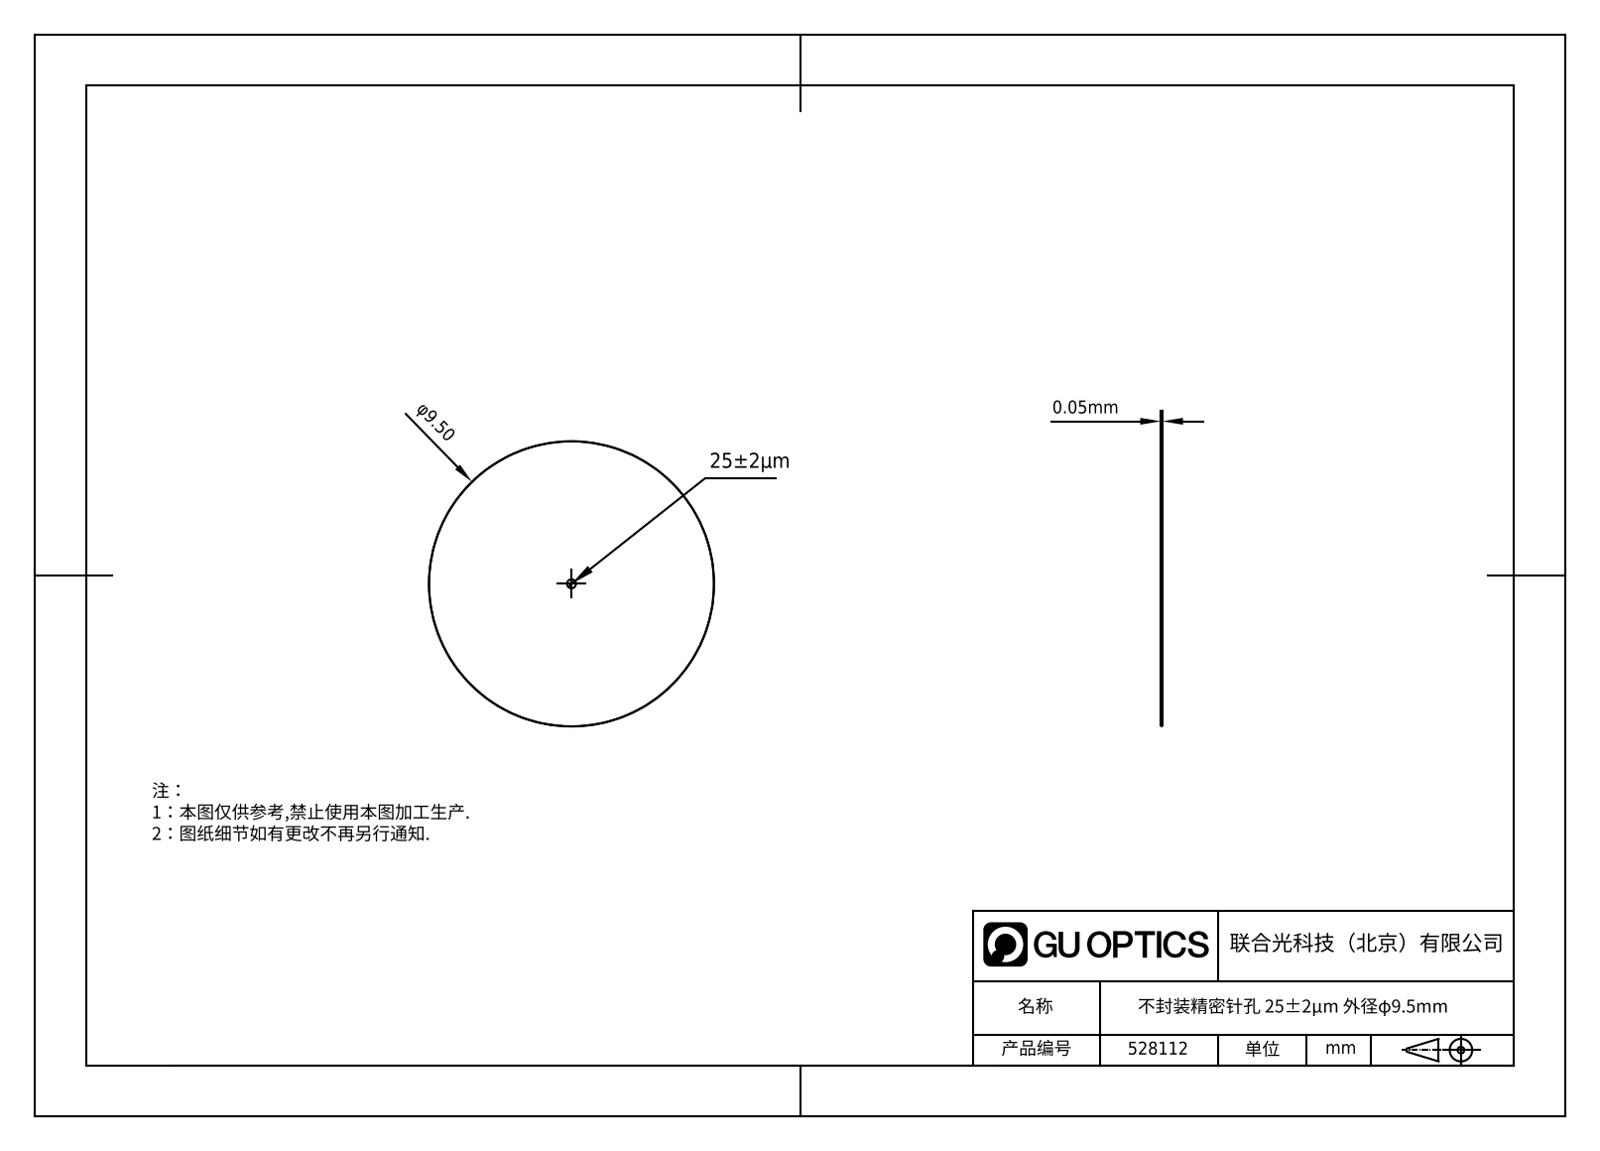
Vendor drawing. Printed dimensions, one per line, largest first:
φ9.50
0.05mm
